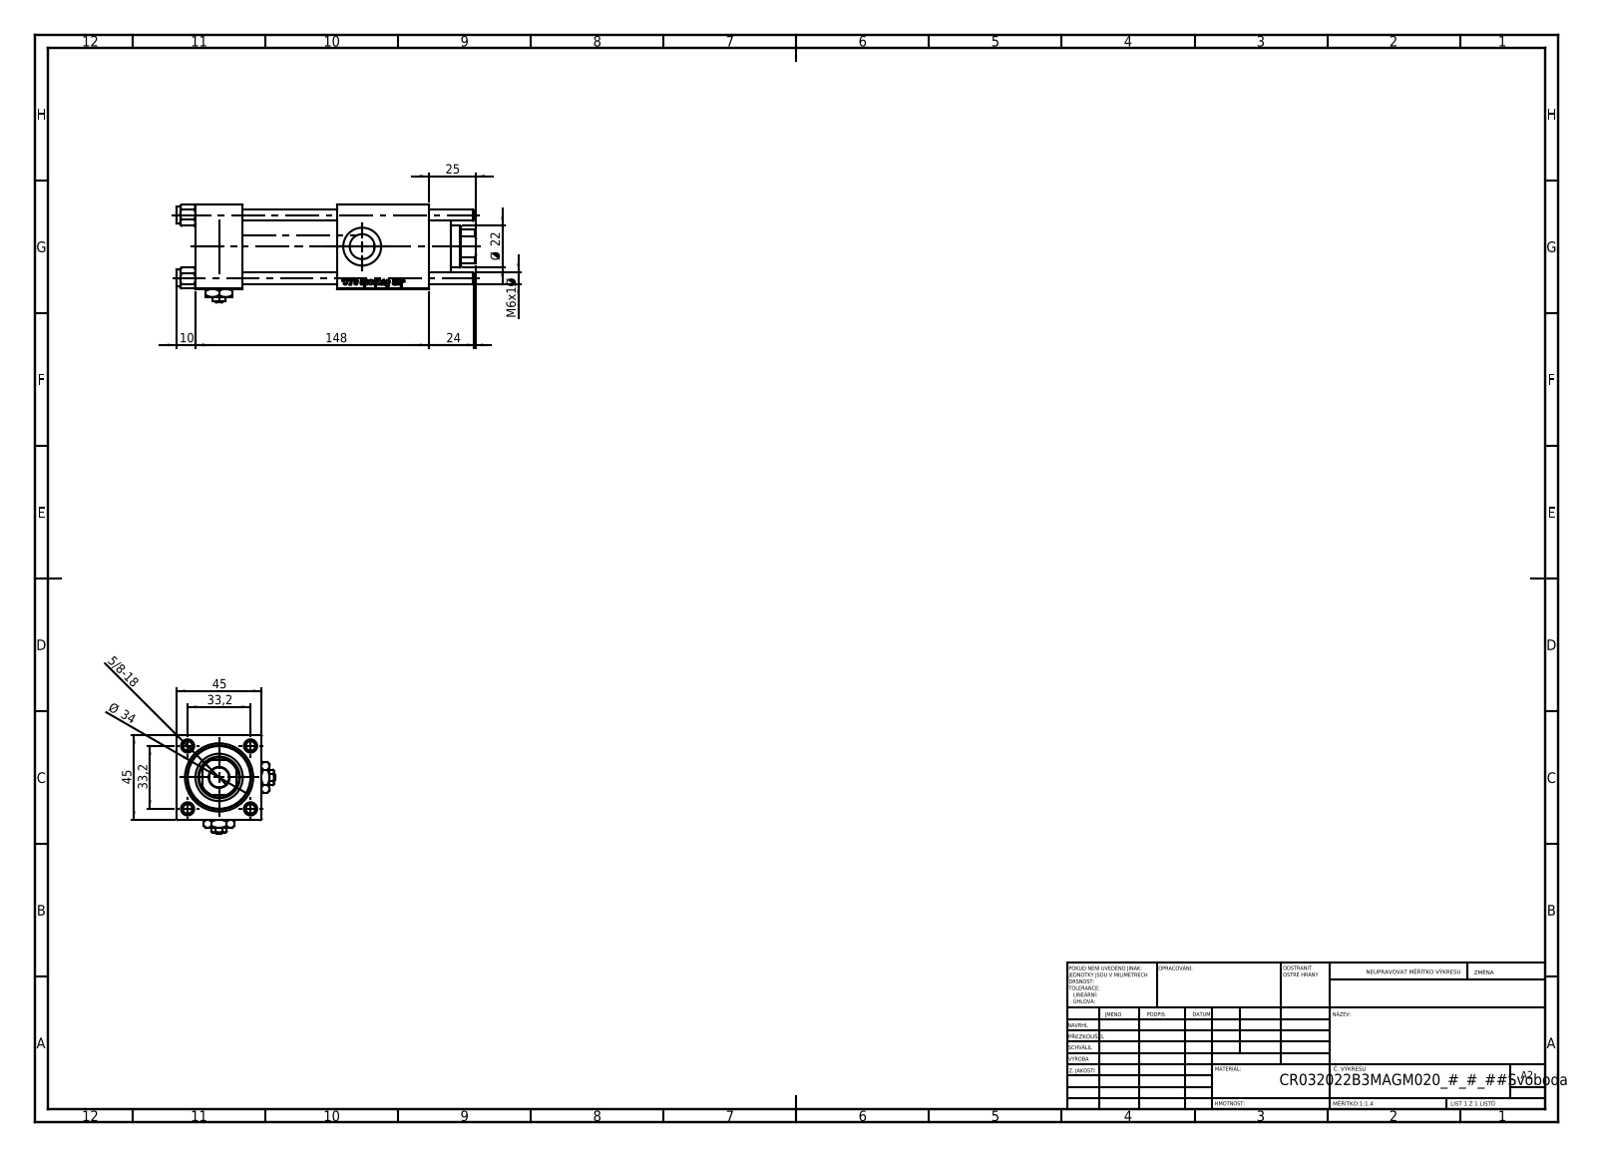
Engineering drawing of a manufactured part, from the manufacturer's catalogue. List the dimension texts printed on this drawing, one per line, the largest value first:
148
45
45
Ø 34
33,2
33,2
25
24
Ø 22
10
M6x1 Ø
5/8-18
